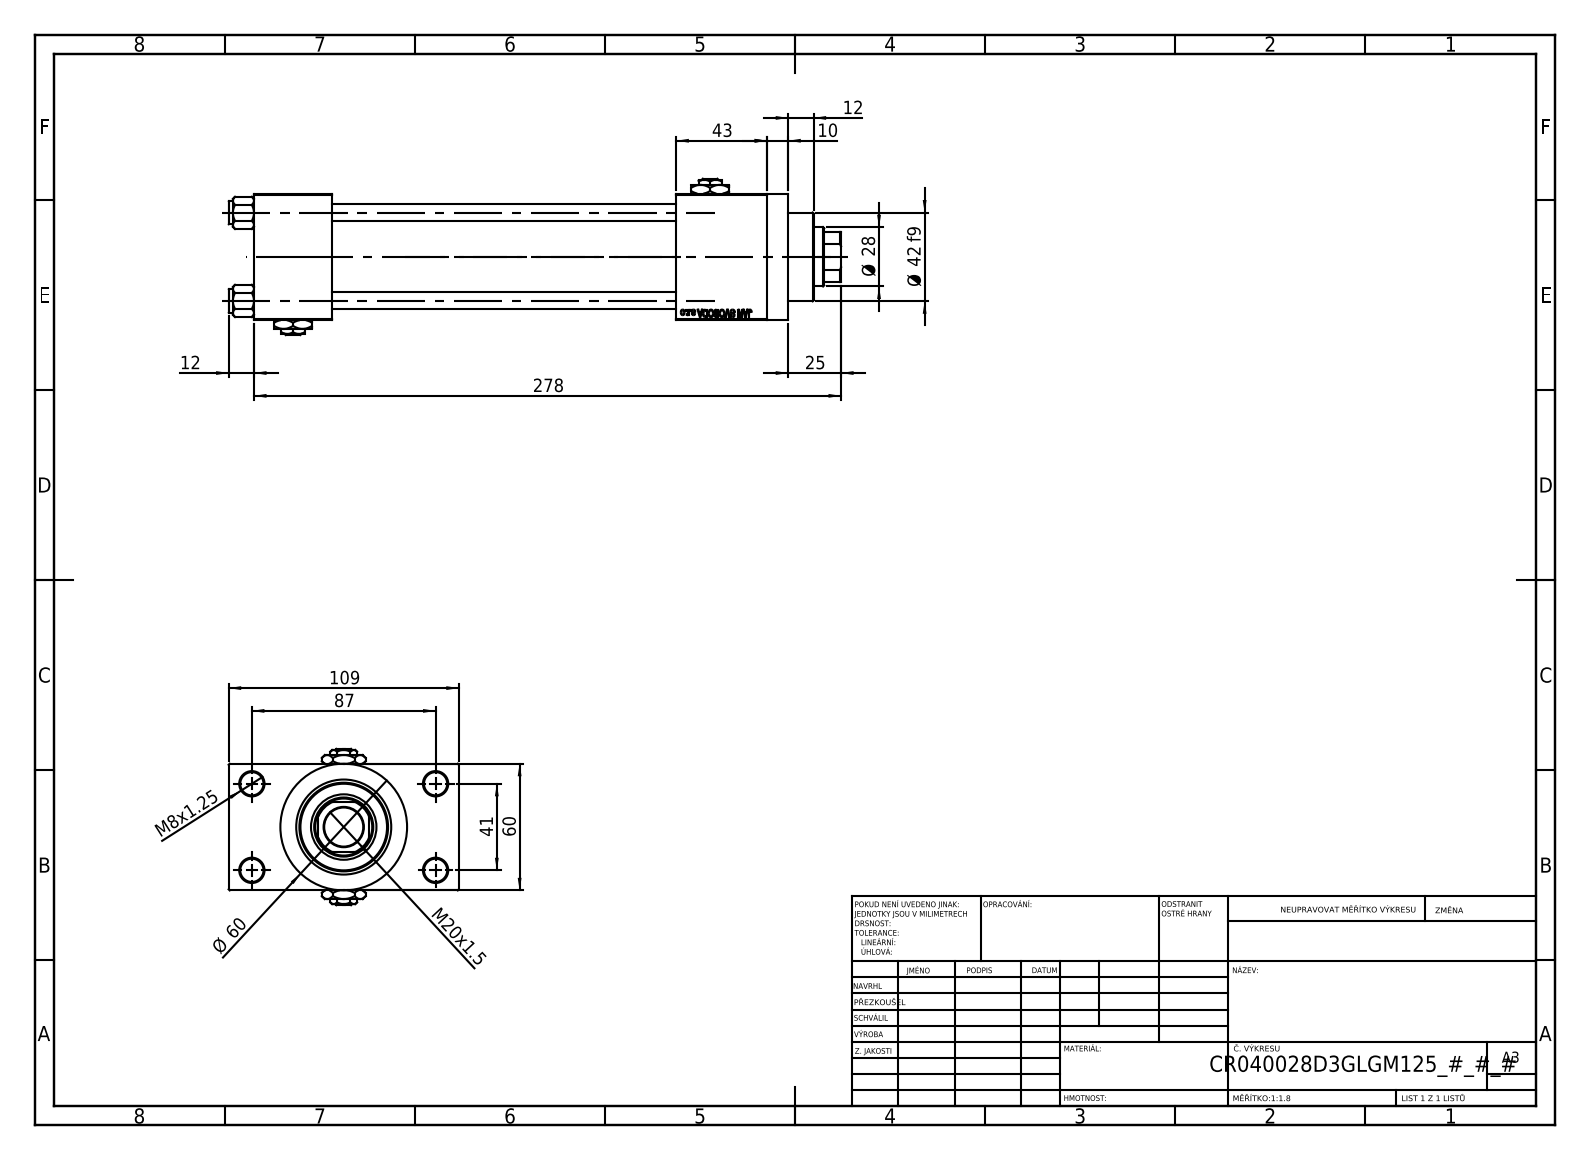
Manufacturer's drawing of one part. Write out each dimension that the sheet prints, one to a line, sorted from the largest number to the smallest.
278
109
87
Ø 60
60
43
Ø 42 f9
41
Ø 28
25
M20x1.5
12
12
10
M8x1.25
